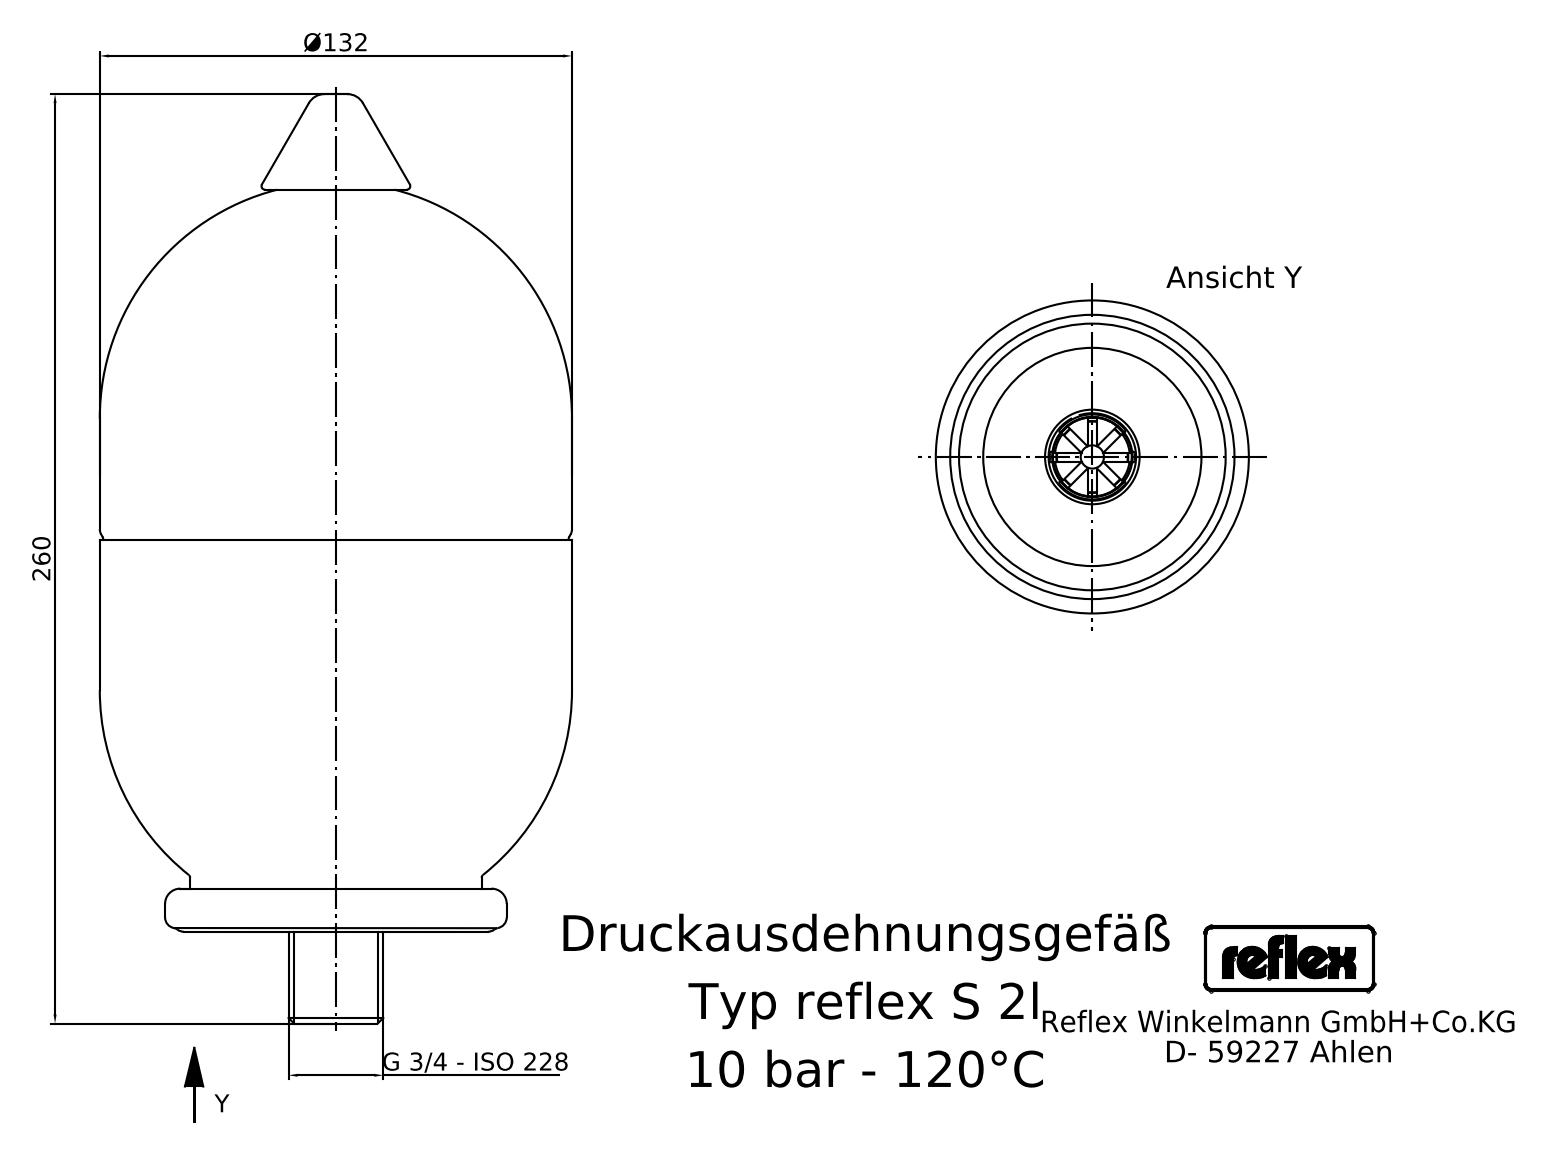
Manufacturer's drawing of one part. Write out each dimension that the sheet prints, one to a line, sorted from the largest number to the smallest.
260
Ø132
G 3/4 - ISO 228
